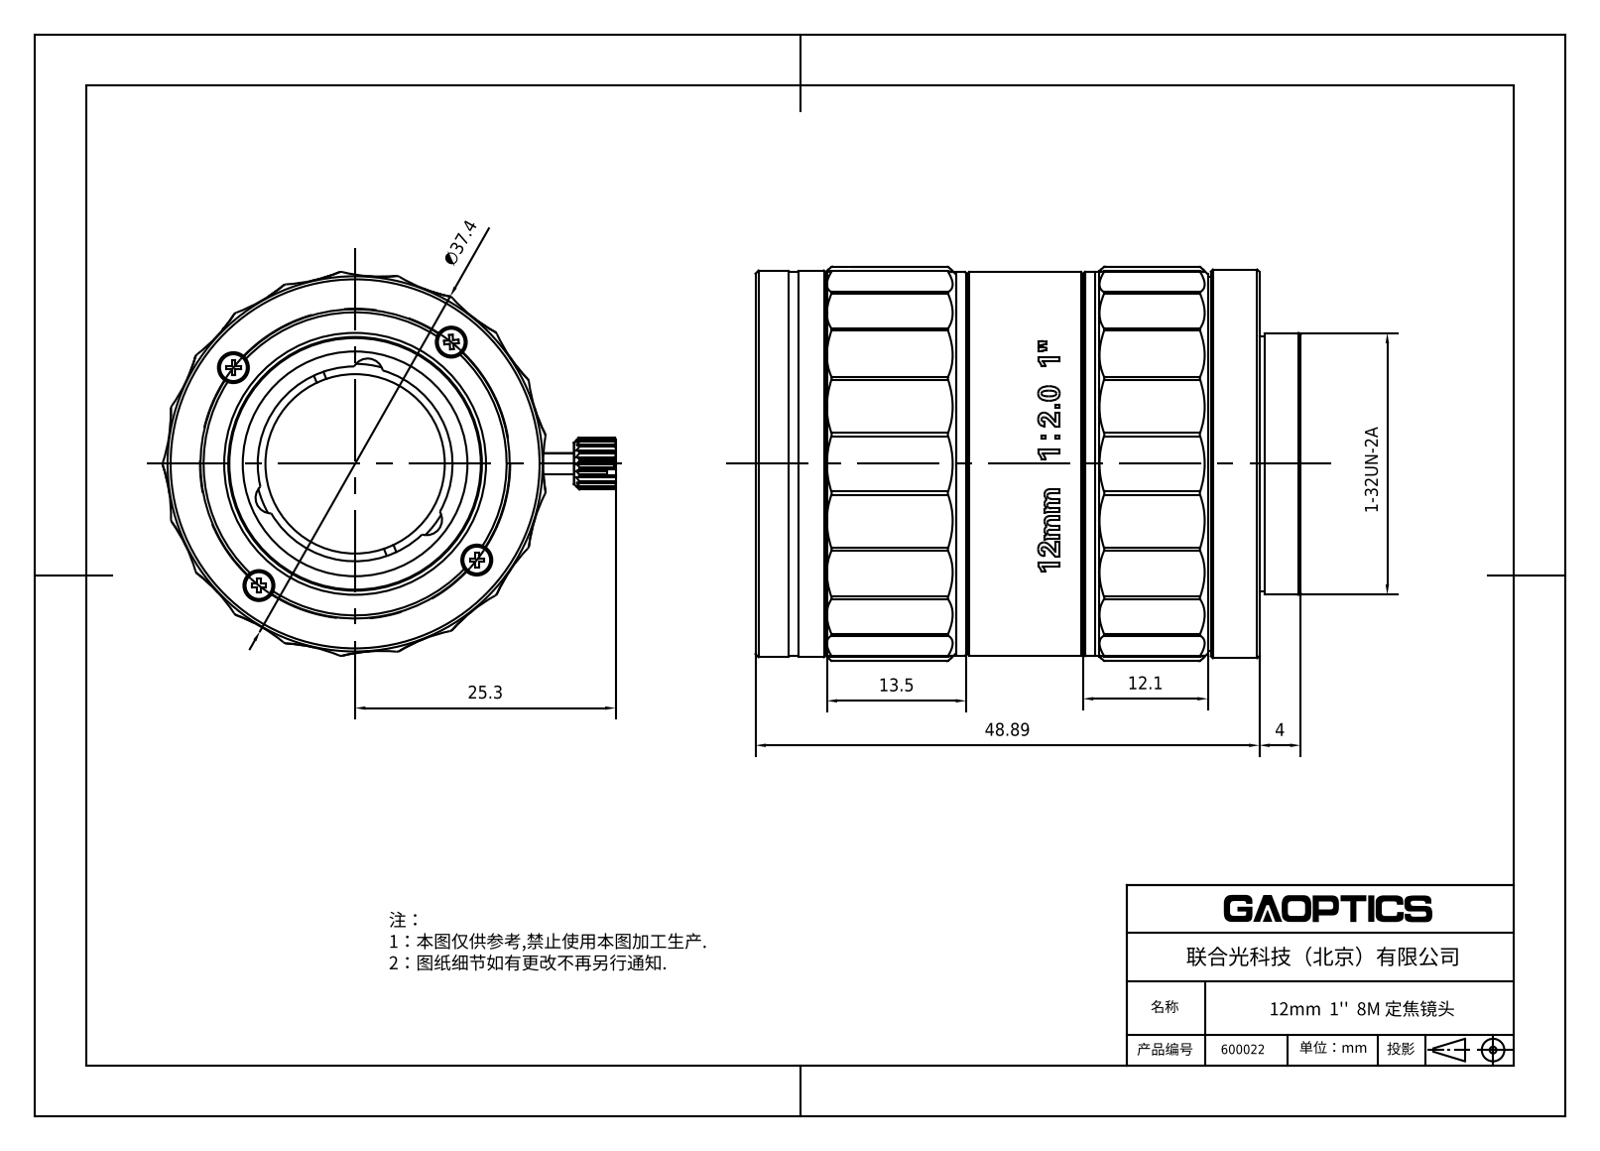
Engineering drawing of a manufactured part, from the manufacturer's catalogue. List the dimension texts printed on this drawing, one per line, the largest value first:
48.89
∅37.4
25.3
13.5
12.1
4
1-32UN-2A
